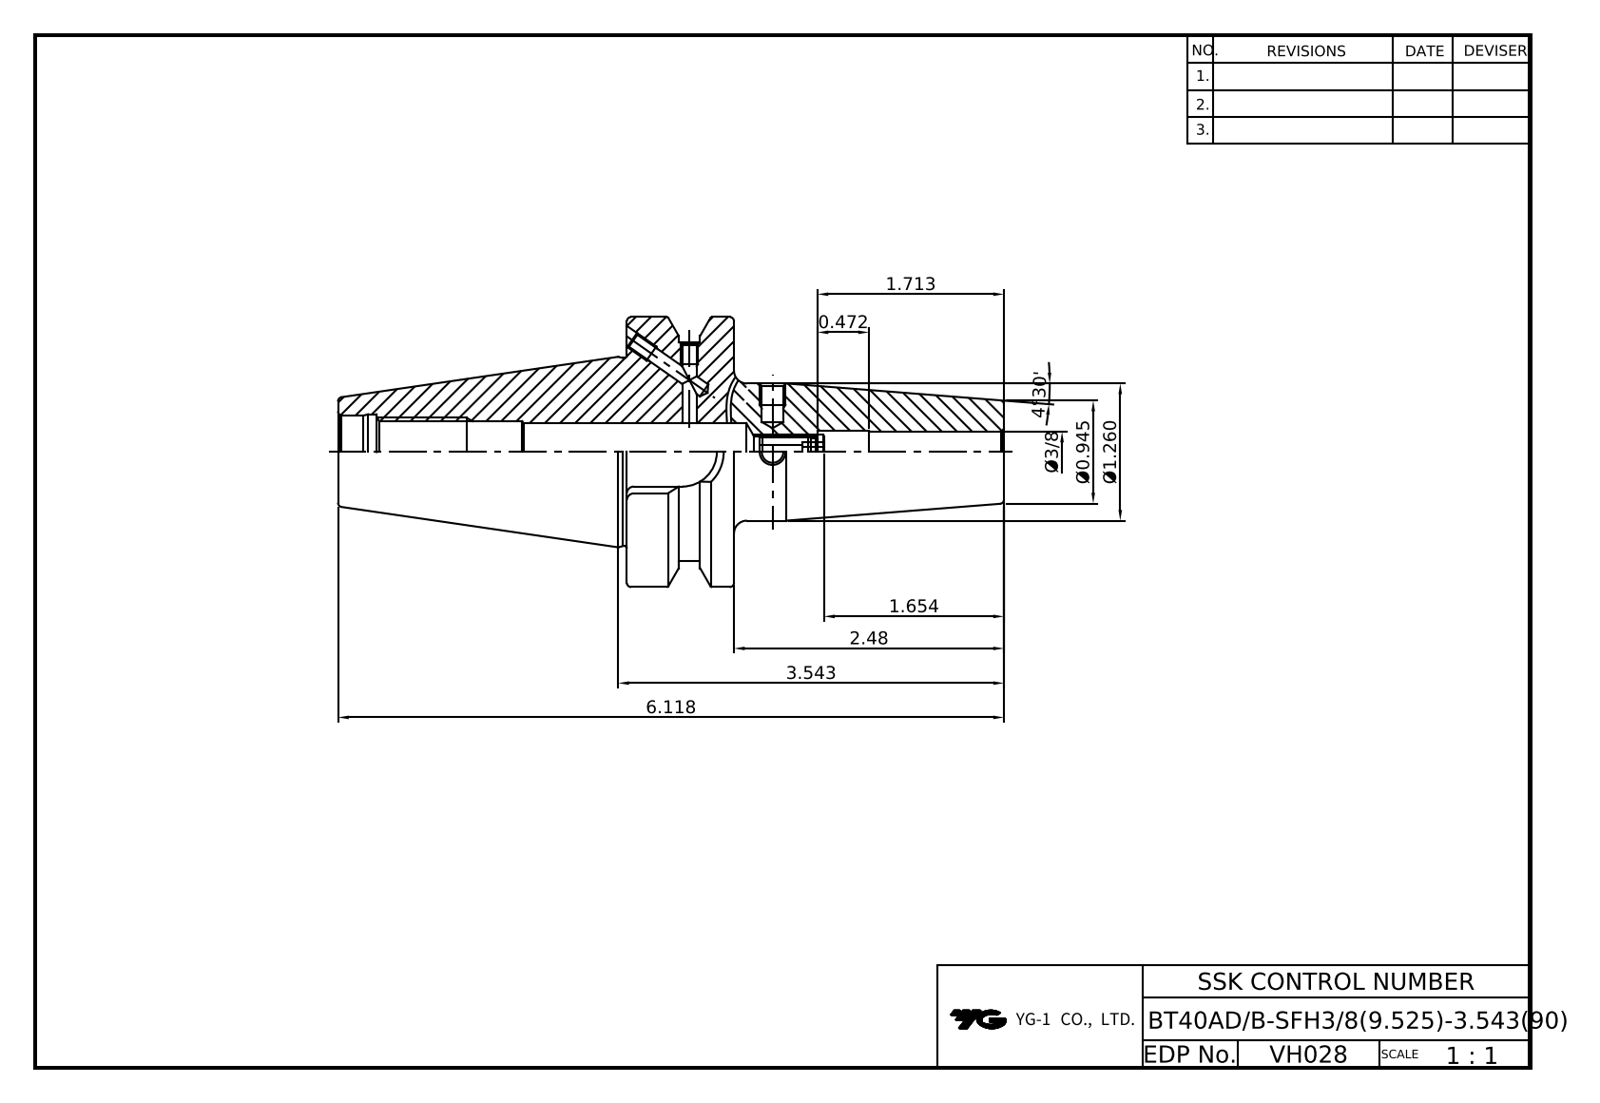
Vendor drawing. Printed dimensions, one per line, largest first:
6.118
4°30'
3.543
2.48
1.713
1.654
Ø1.260
Ø0.945
0.472
